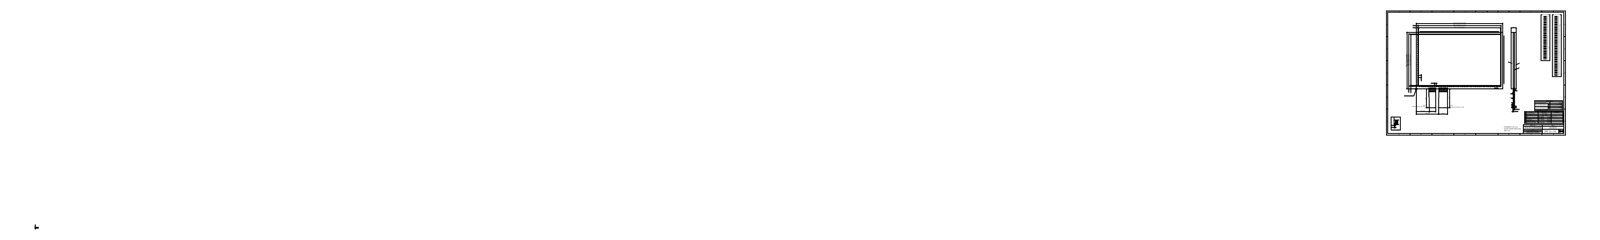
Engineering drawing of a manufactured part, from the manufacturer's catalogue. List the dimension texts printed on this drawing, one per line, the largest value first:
275±0.5 (Touch panel)
264.12 (Viewing area)
261.2 (Active area)
180±0.5 (Touch panel)
166.2 (Viewing area)
163.2 (Active area)
(71.42)
60±1
60±1
(41.42)
28±0.1
20.5±0.1
10.25
(10)
8.75
7.07
5.93
5.61
5
2.35±0.2
1.1
0.5
0.3±0.03
0.3±0.03
0.3
